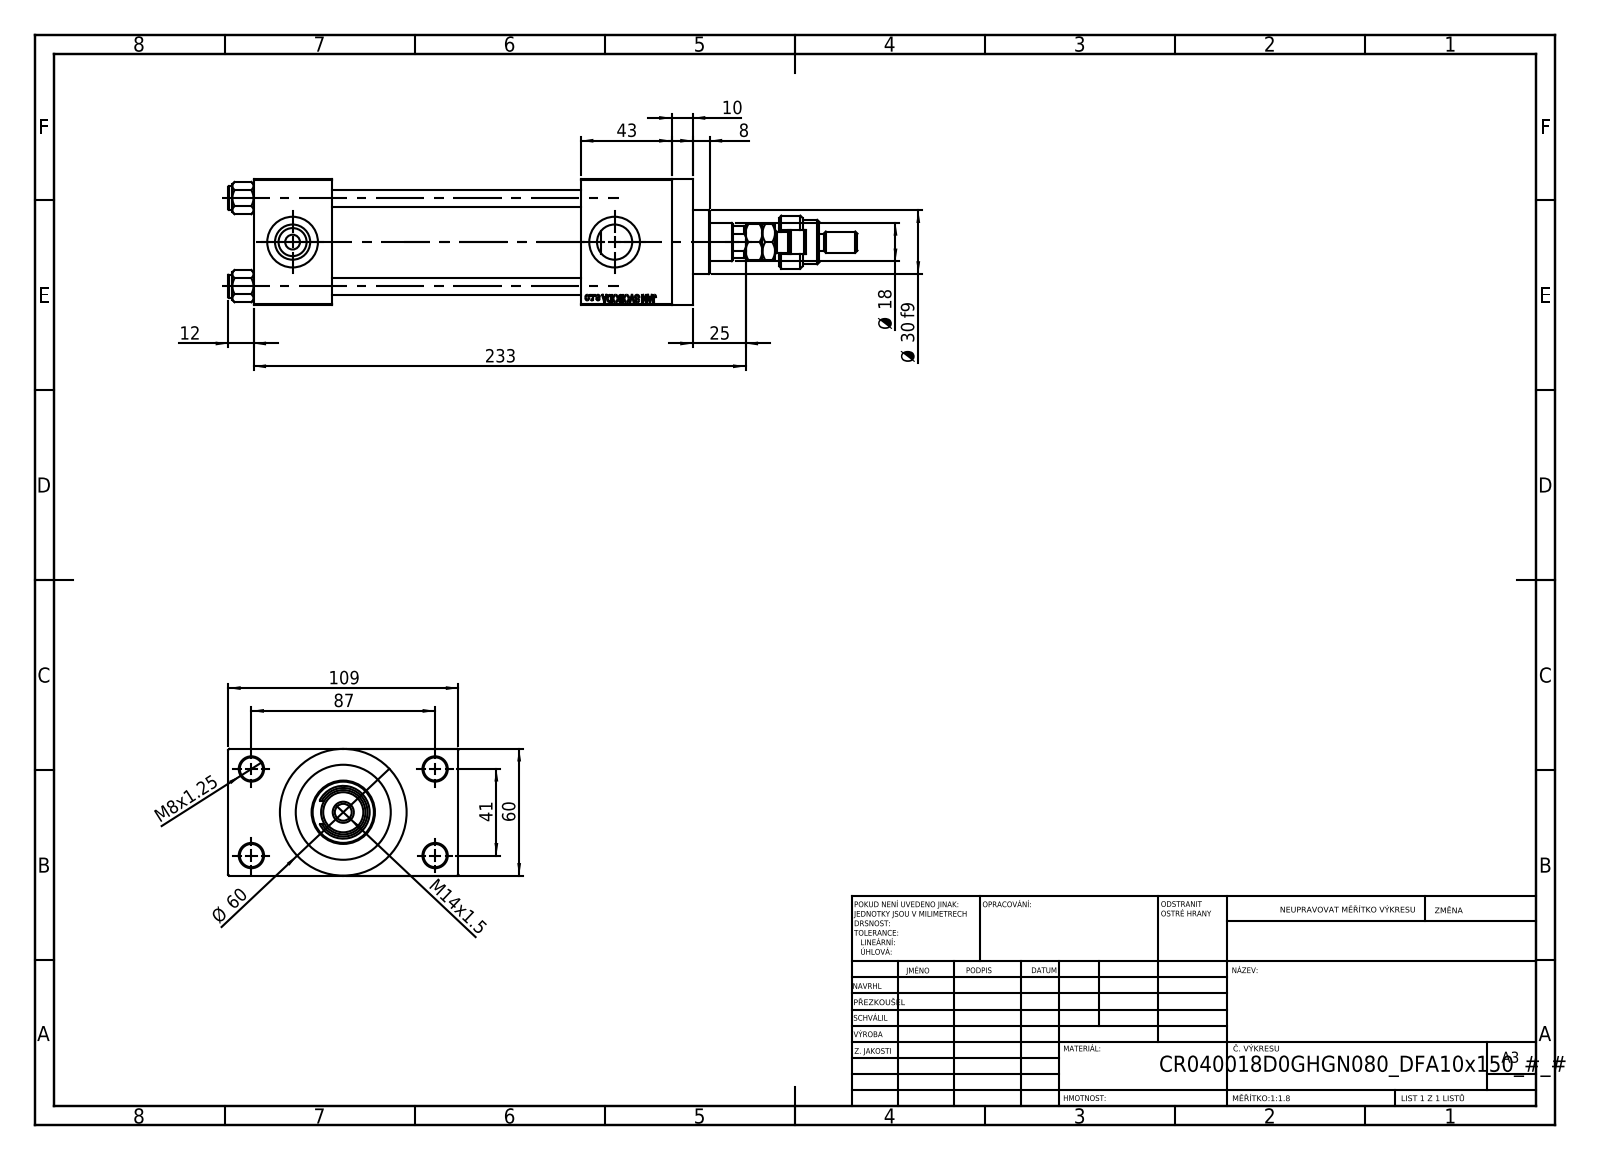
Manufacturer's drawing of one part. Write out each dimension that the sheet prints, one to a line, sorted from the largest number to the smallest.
233
109
87
Ø 60
60
43
41
Ø 30 f9
25
Ø 18
M14x1.5
12
10
8
M8x1.25
